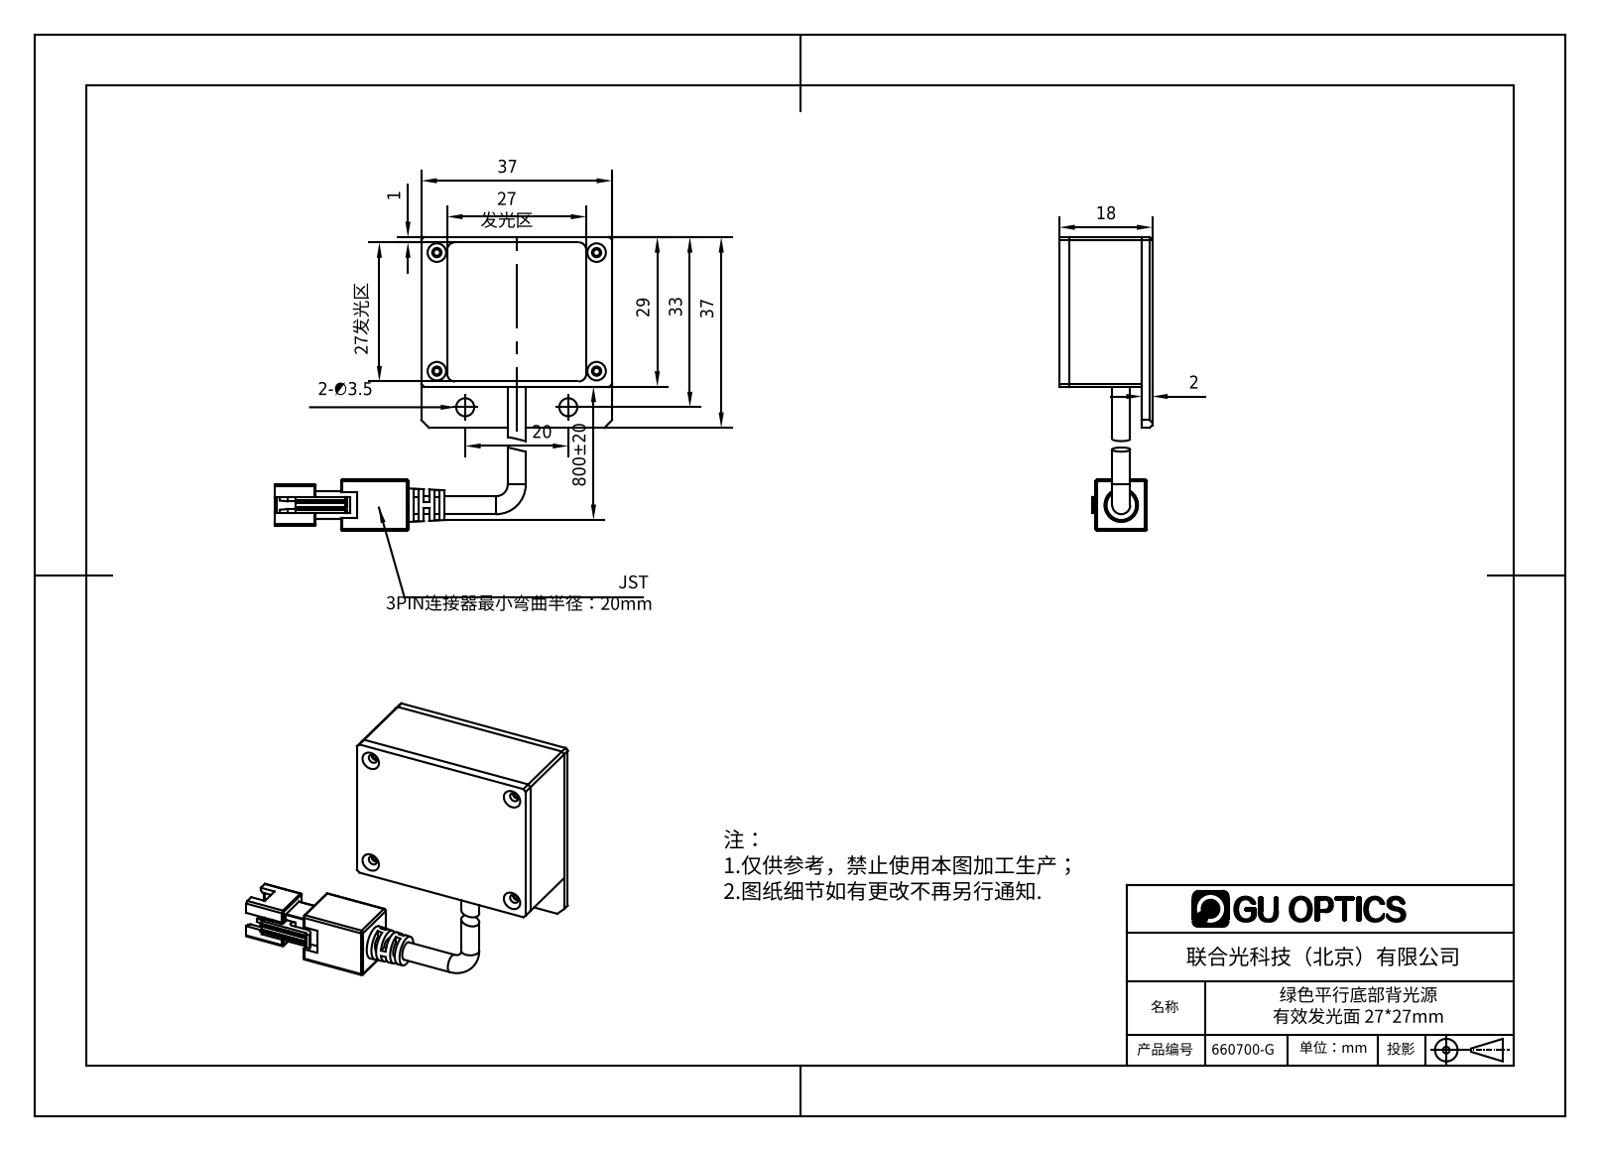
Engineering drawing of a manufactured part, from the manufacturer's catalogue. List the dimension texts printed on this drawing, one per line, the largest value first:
800±20
37
37
33
29
27 发光区
27发光区
20
18
2-∅3.5
2
1
